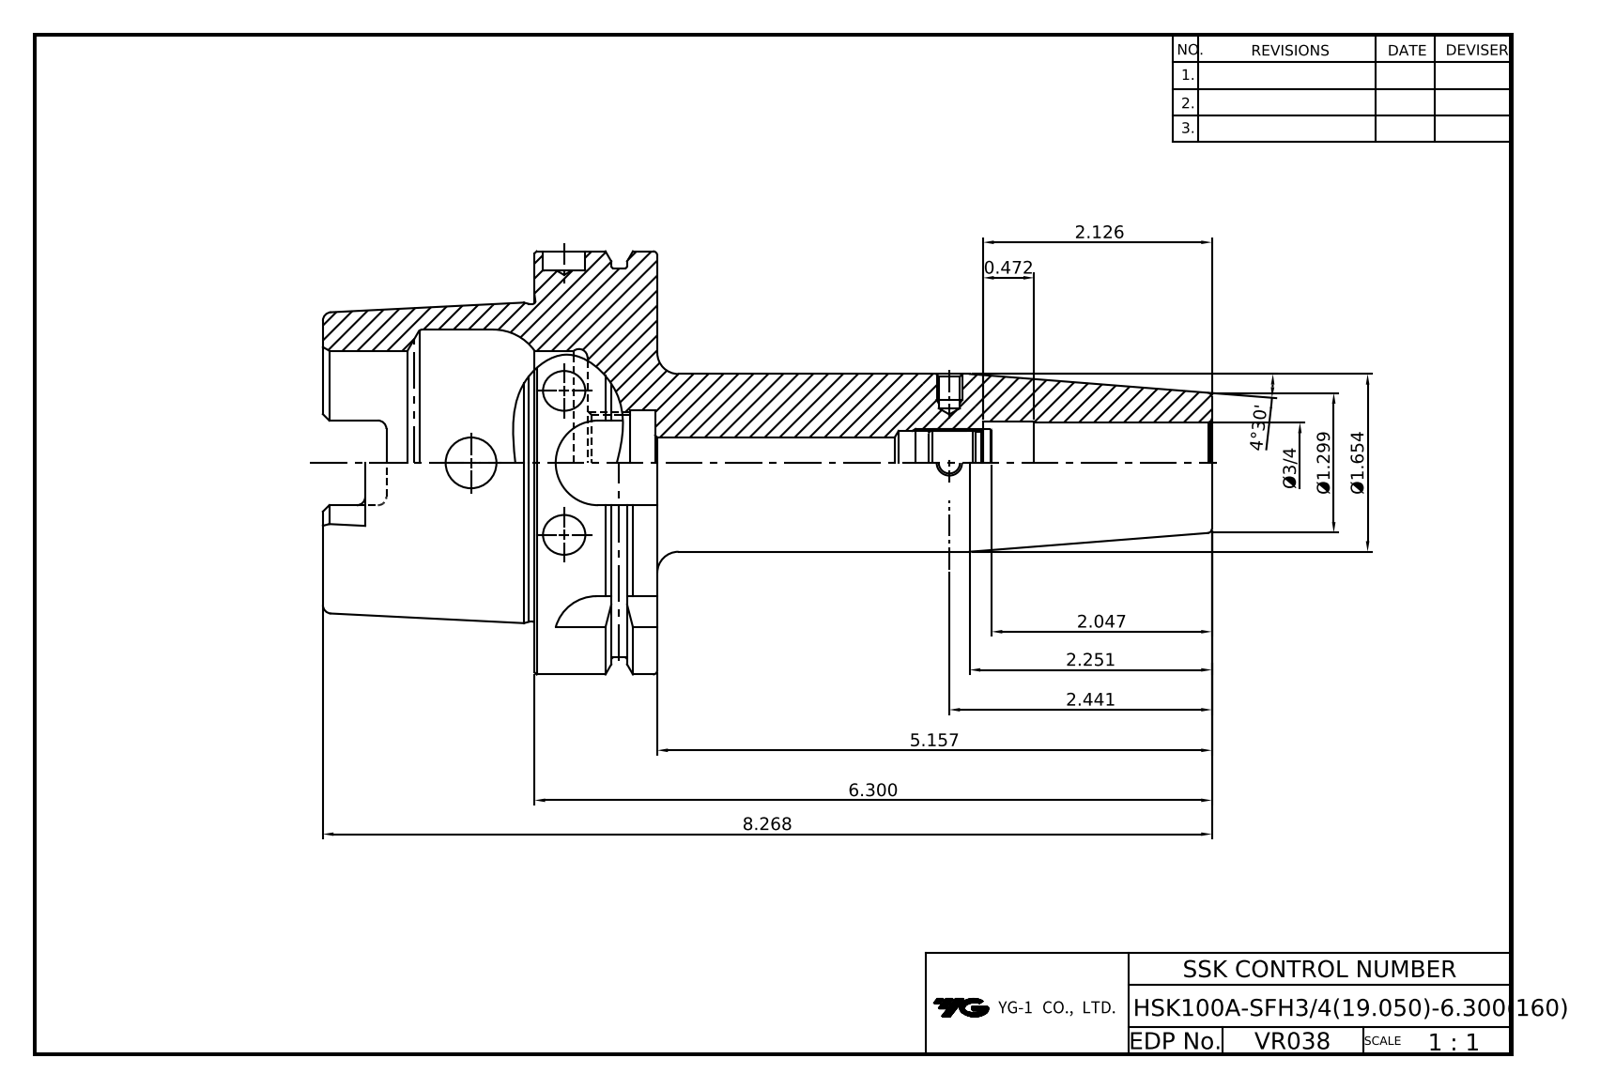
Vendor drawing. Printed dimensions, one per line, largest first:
8.268
6.300
5.157
4°30'
2.441
2.251
2.126
2.047
Ø1.654
Ø1.299
Ø3/4
0.472
